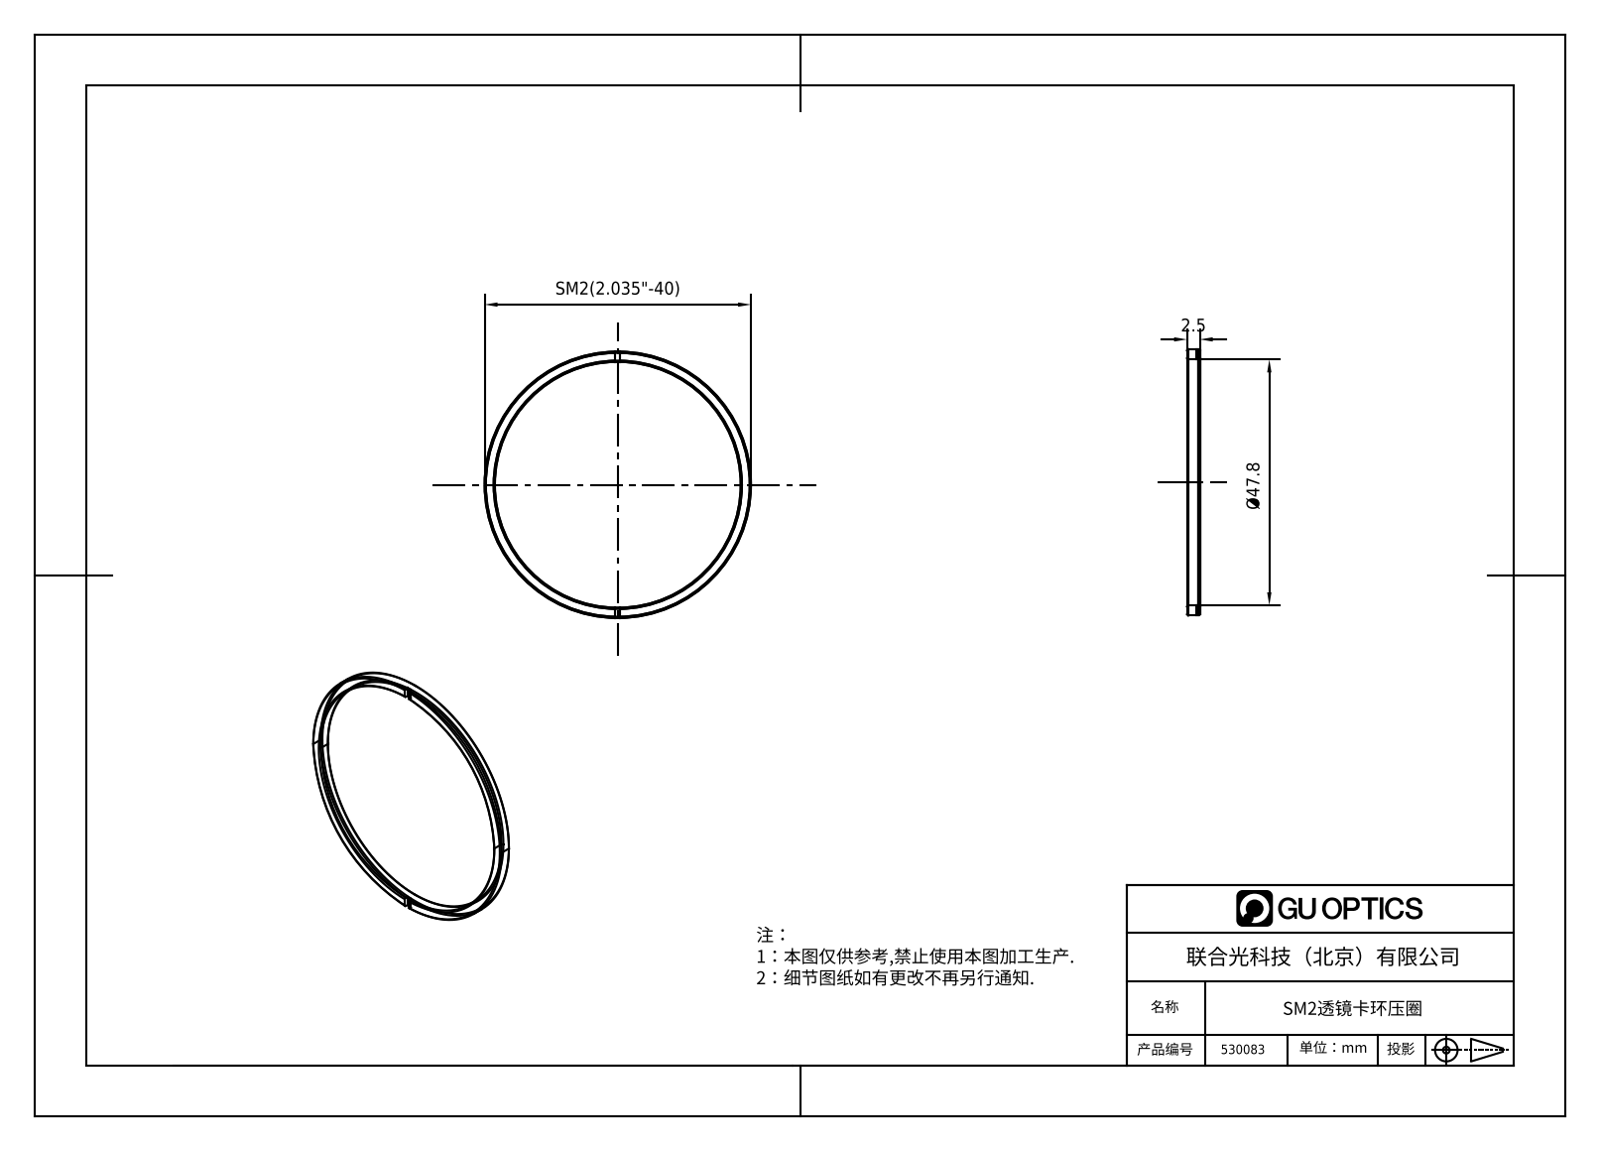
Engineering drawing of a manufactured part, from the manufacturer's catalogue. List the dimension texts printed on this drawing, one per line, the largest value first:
Ø47.8
2.5
SM2(2.035"-40)
